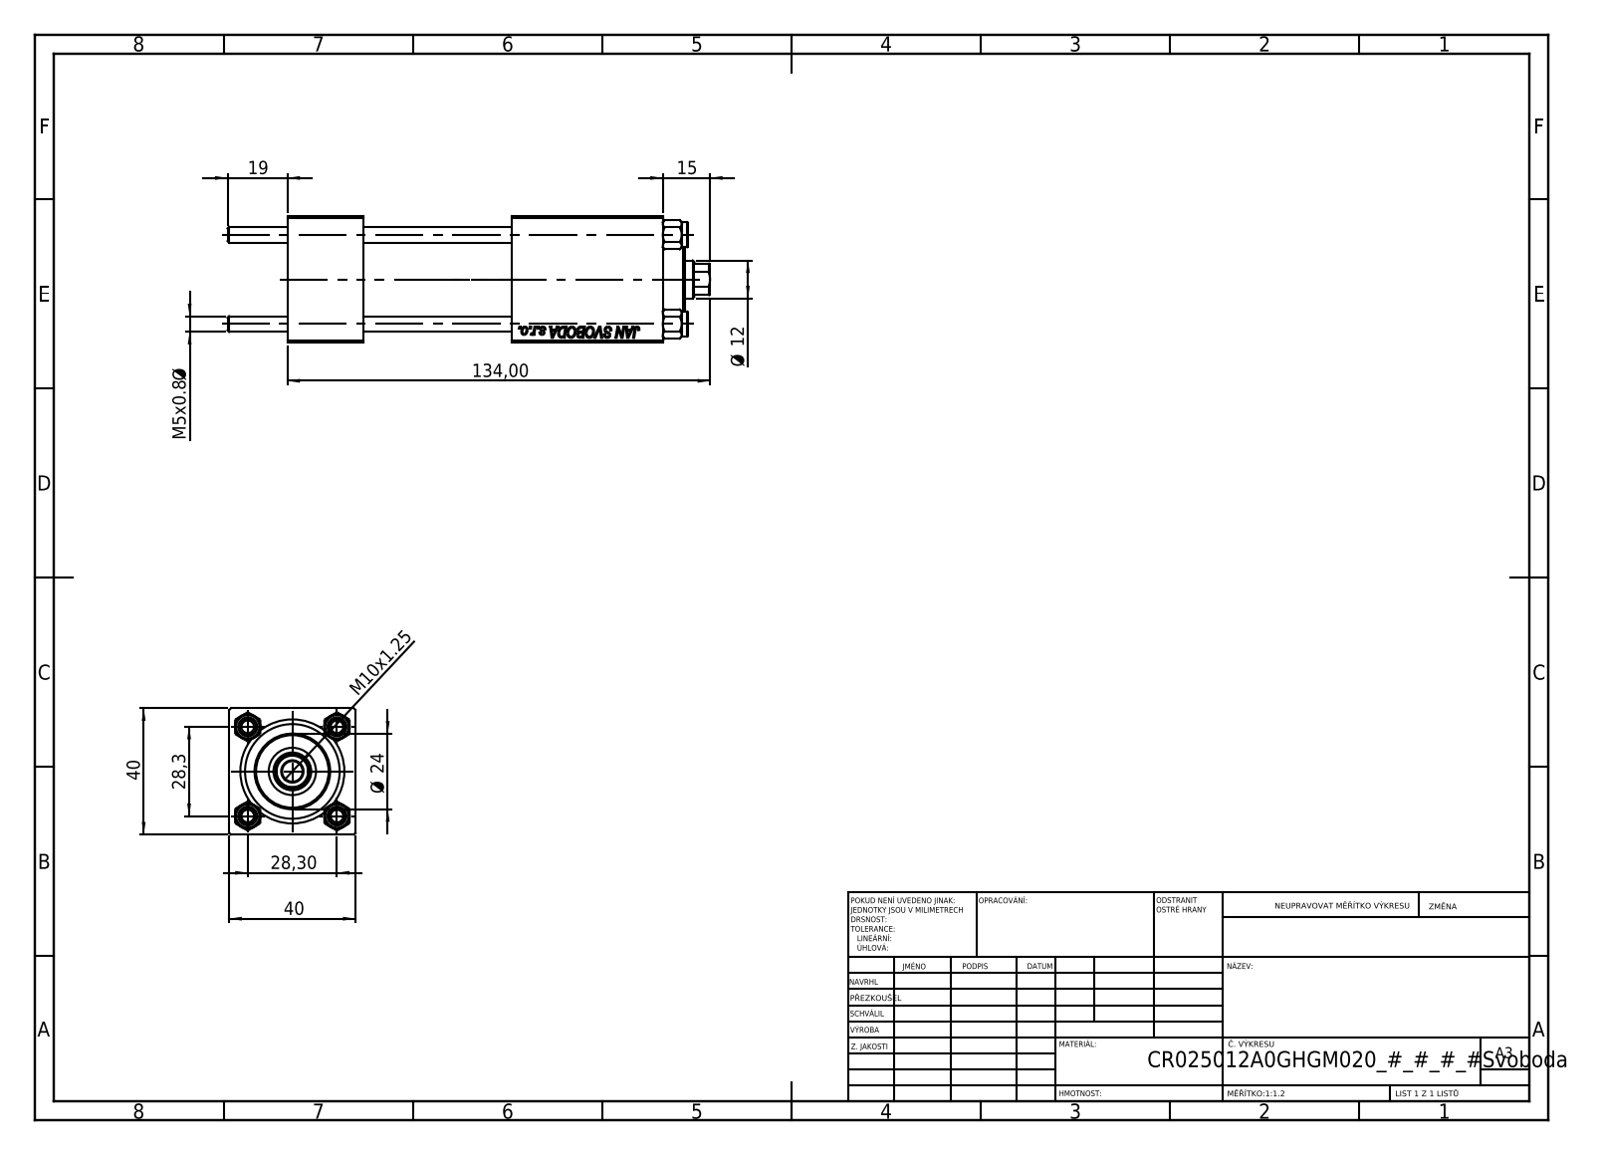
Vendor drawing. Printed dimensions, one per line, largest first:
134,00
40
40
28,3
28,30
Ø 24
19
15
Ø 12
M10x1.25
M5x0.8 Ø
